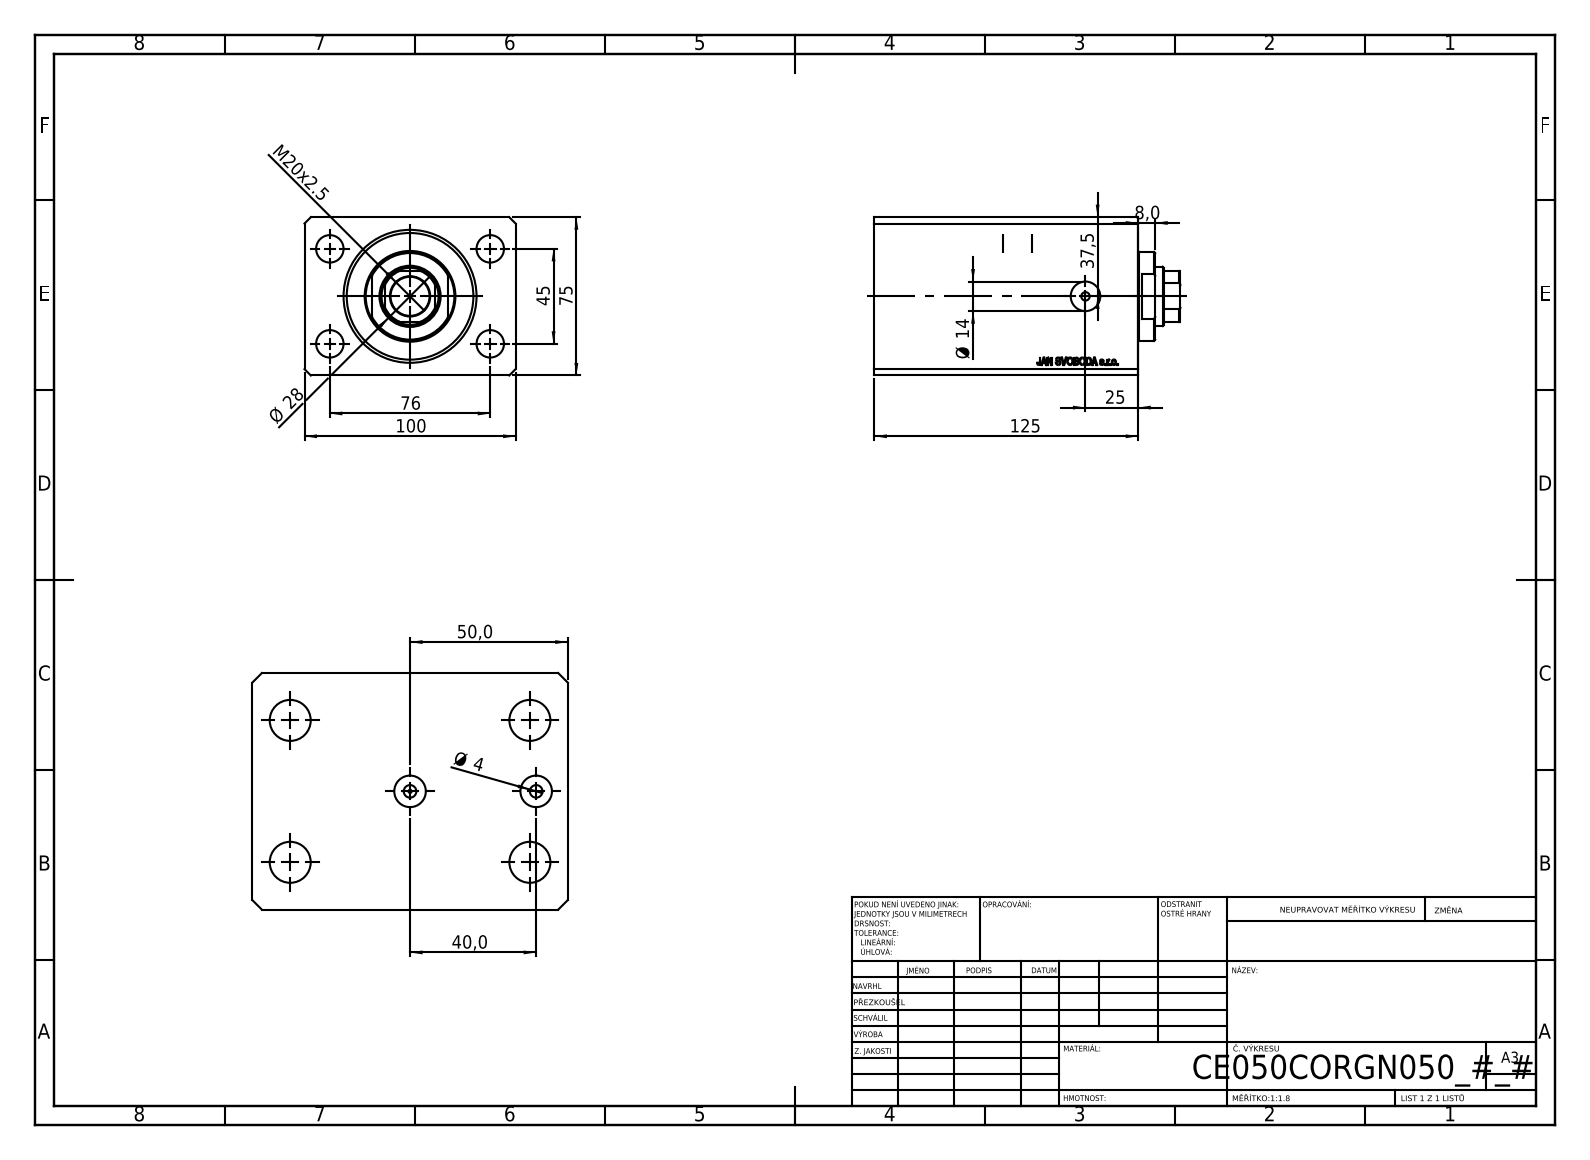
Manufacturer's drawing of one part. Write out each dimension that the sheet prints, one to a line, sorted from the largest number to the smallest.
125
100
76
75
50,0
45
40,0
37,5
Ø 28
25
M20x2.5
Ø 14
8,0
Ø 4
